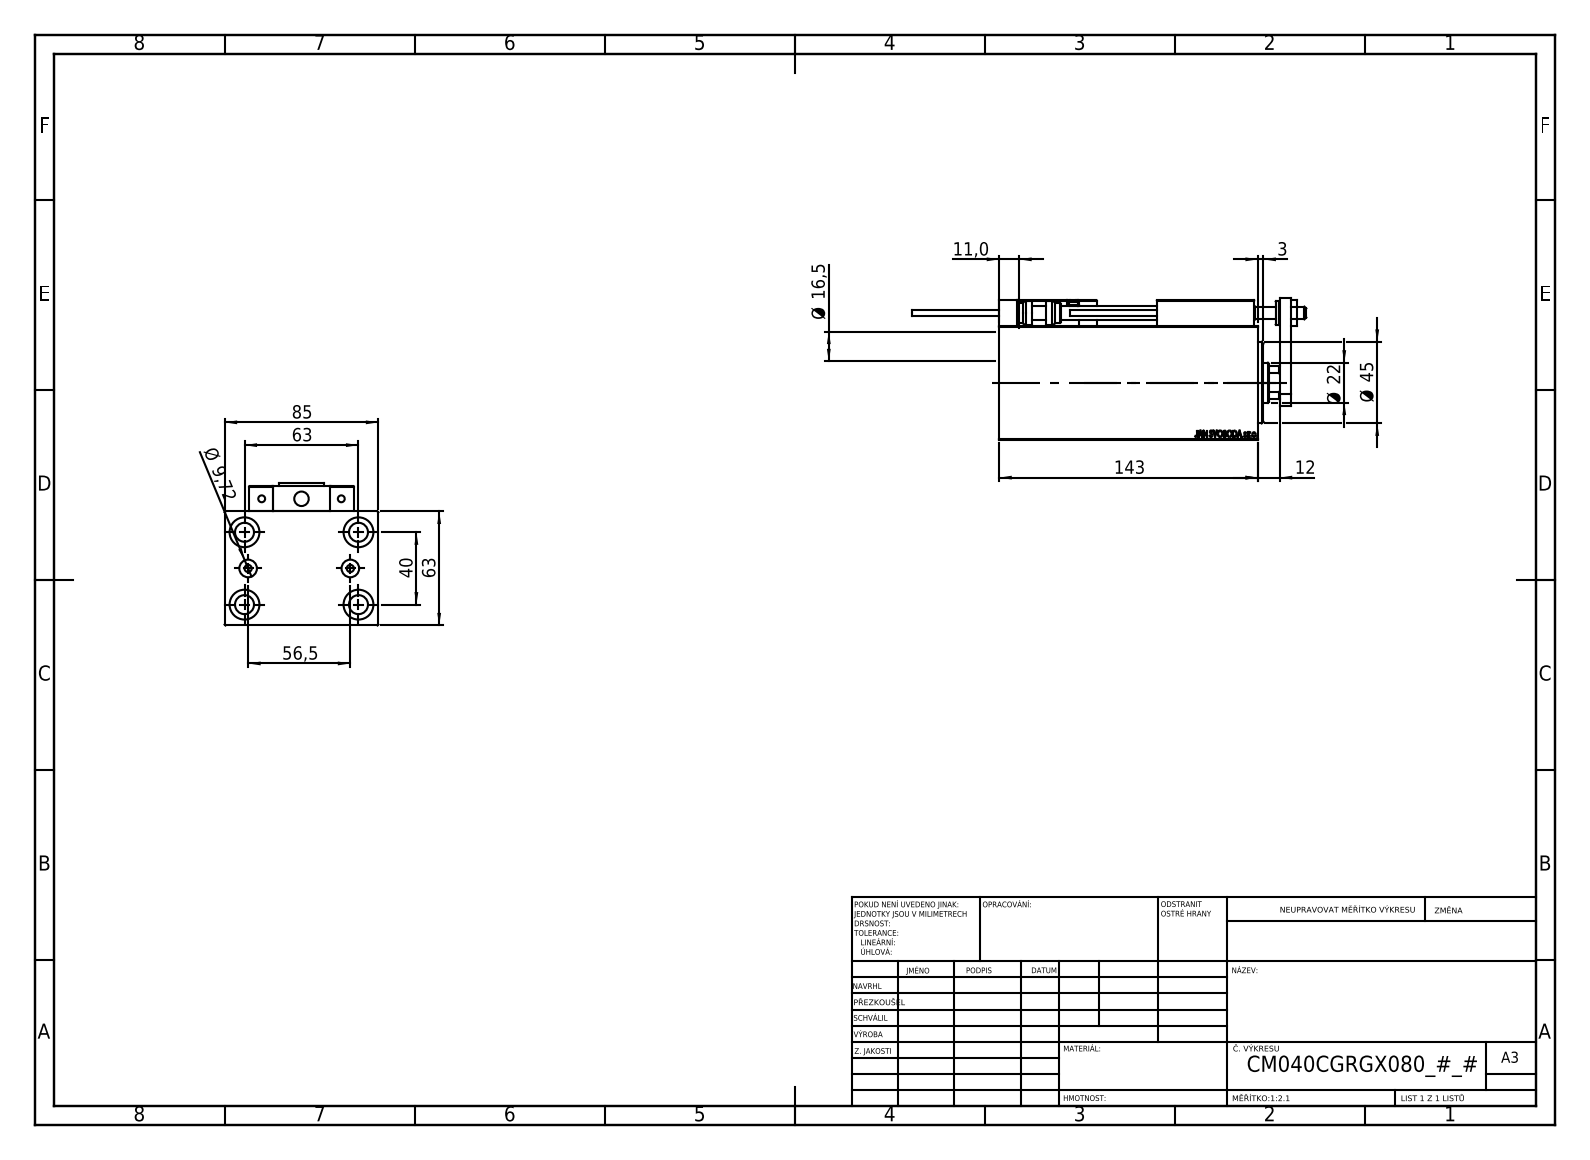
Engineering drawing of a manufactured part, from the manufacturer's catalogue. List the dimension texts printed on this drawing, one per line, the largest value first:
143
85
63
63
56,5
Ø 45
40
Ø 22
Ø 16,5
12
11,0
Ø 9,72
3
